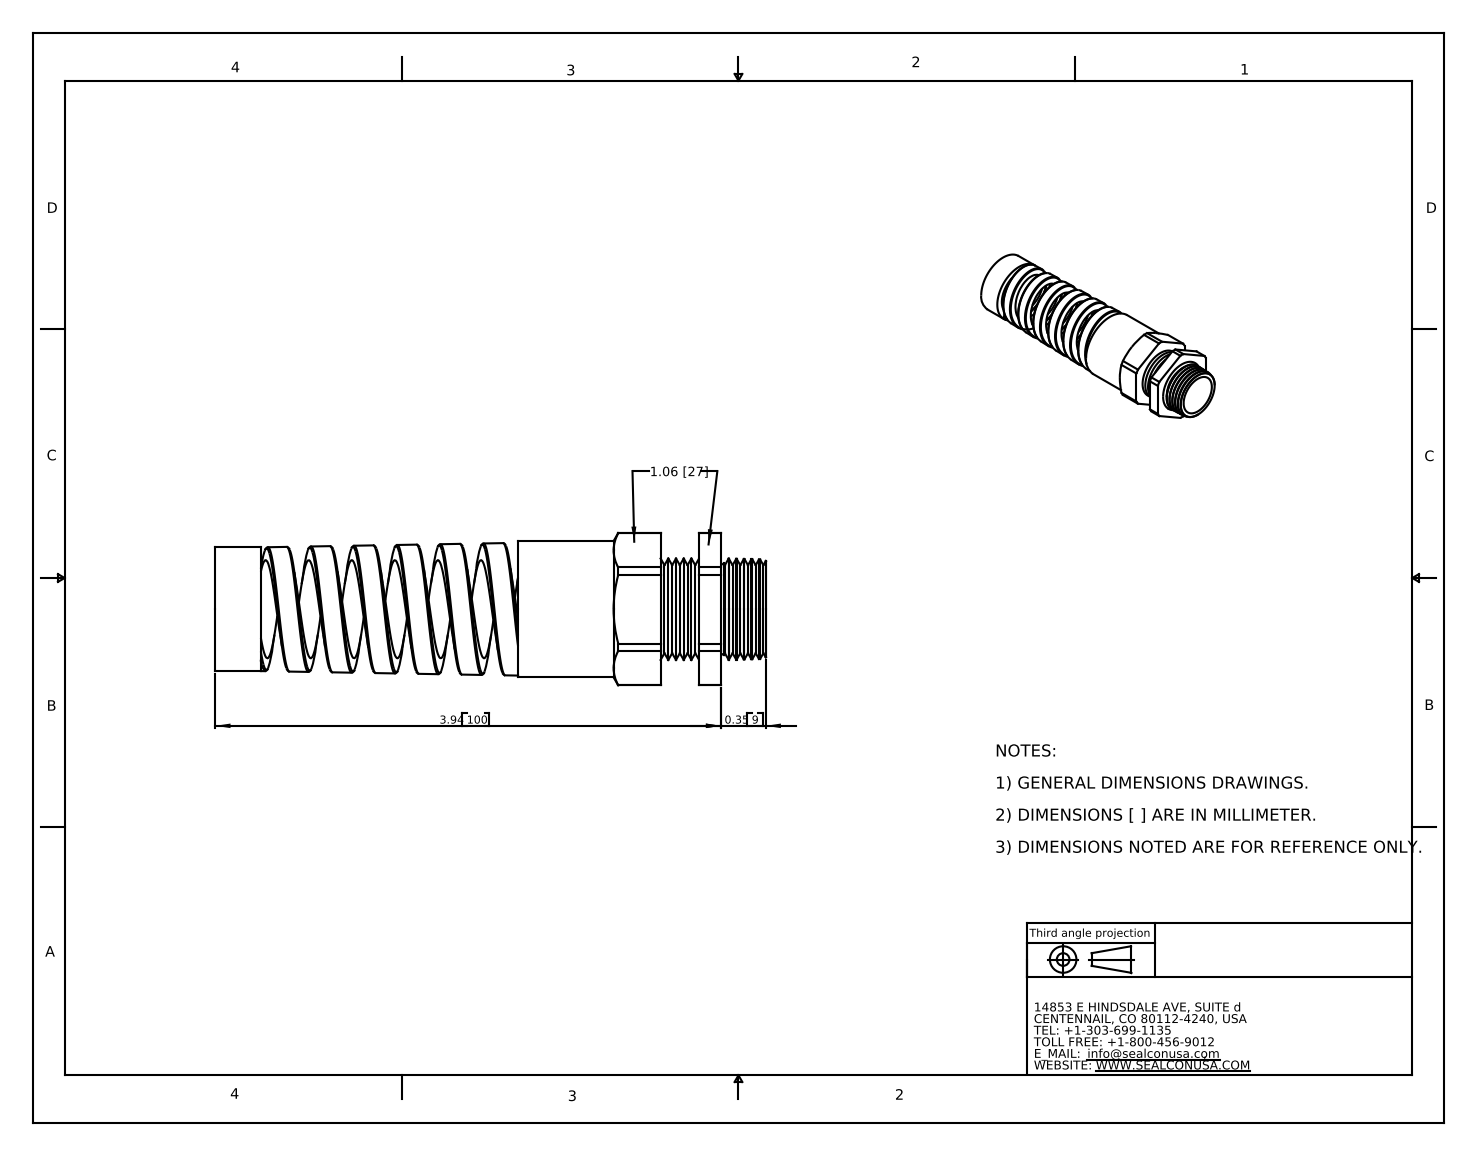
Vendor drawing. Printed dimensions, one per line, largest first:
3.94 100
0.35 9
